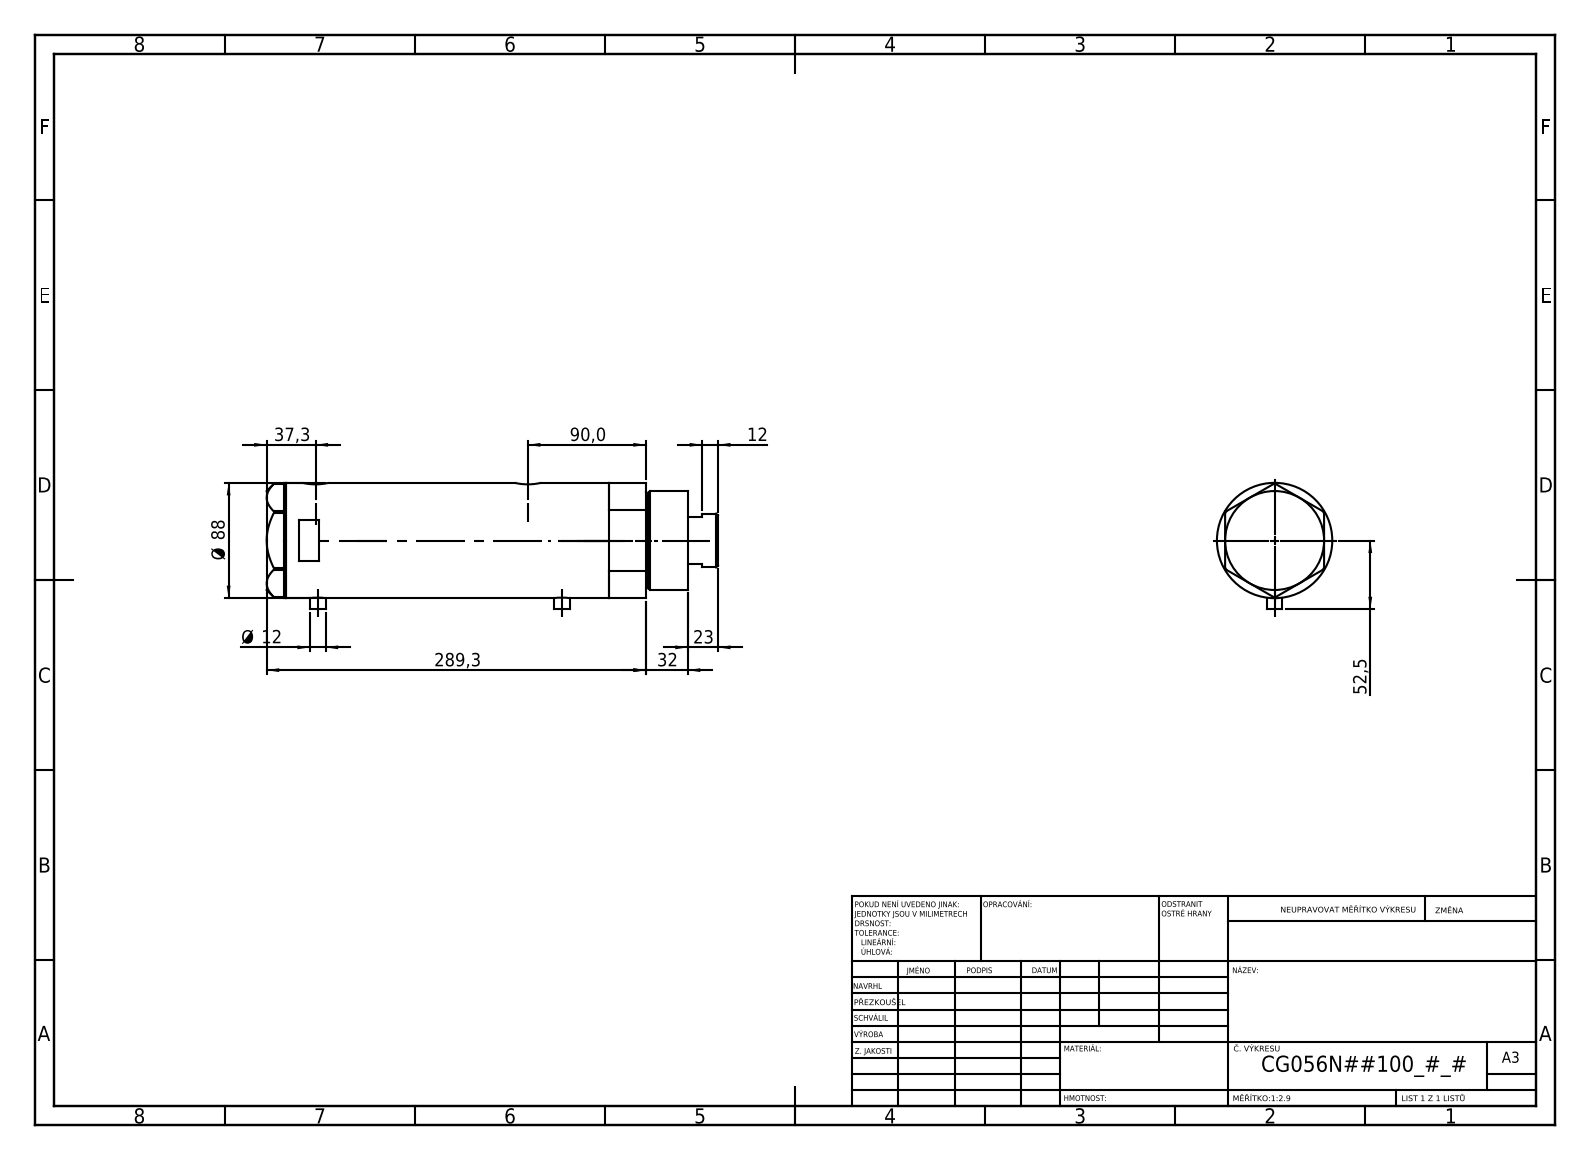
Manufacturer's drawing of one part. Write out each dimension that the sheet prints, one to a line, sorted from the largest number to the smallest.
289,3
90,0
Ø 88
52,5
37,3
32
23
12
Ø 12
